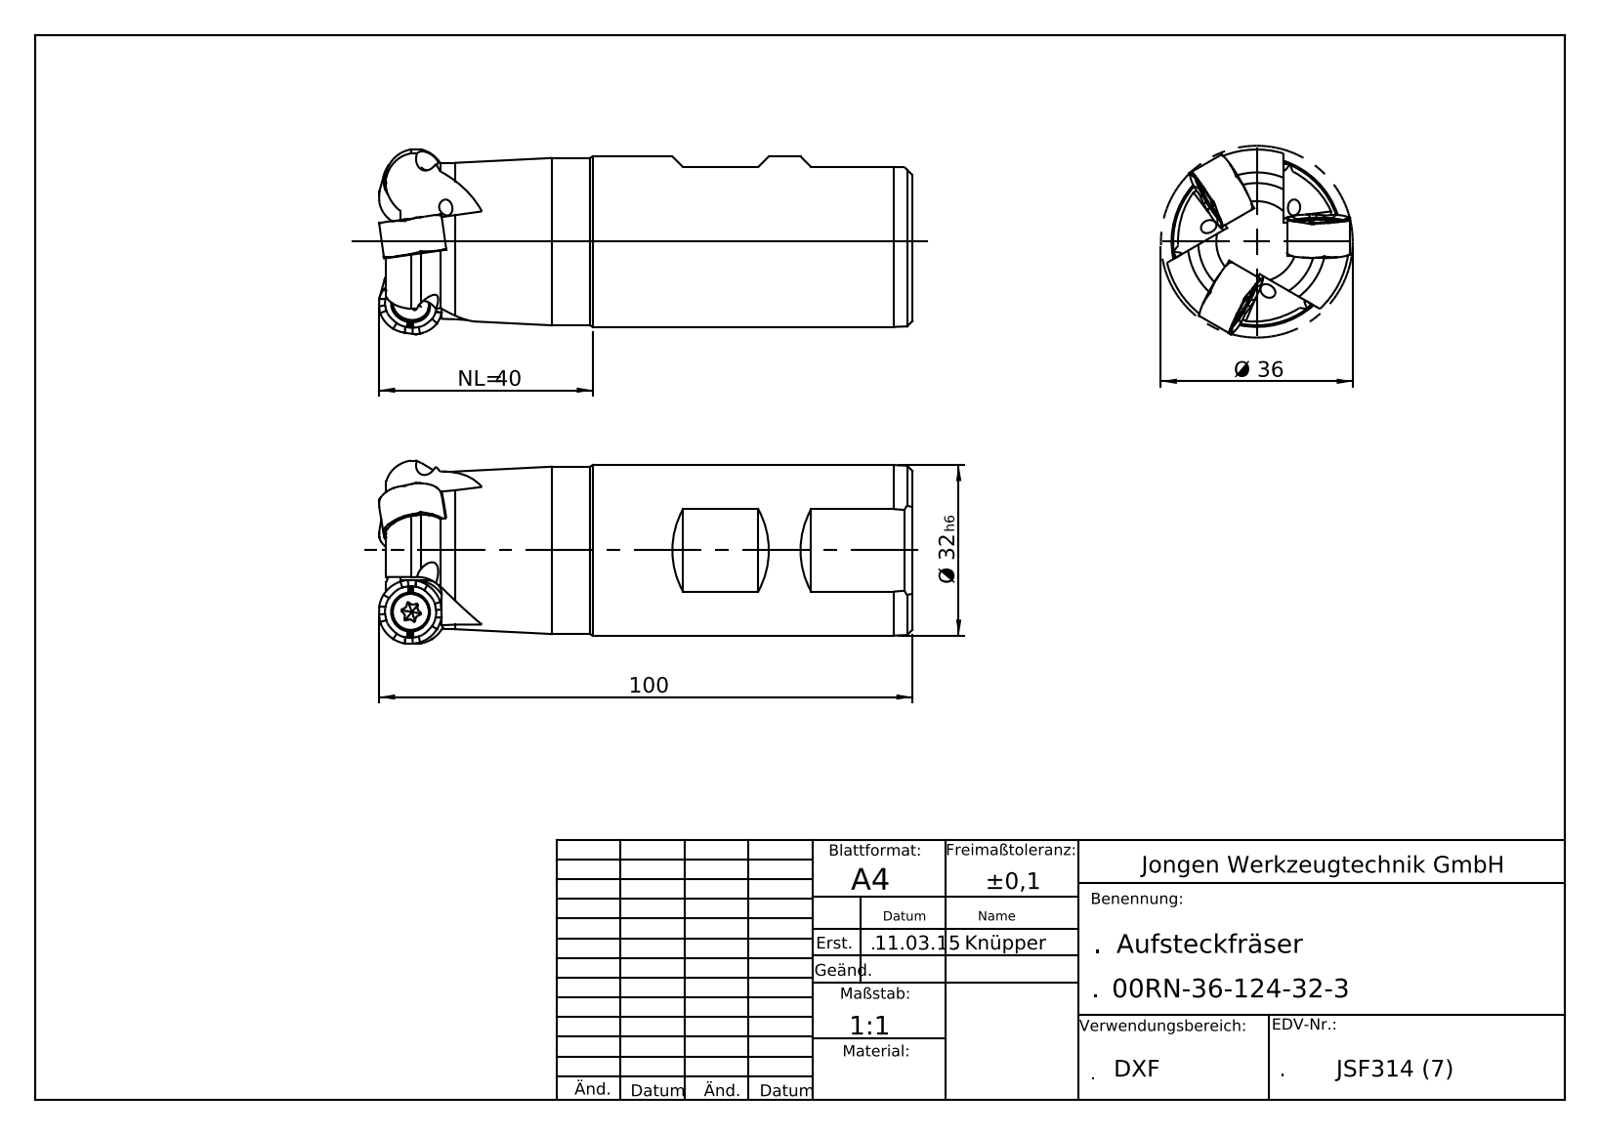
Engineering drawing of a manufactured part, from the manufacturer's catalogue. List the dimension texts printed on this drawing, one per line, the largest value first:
100
NL= 40
Ø 36
Ø 32 h6
